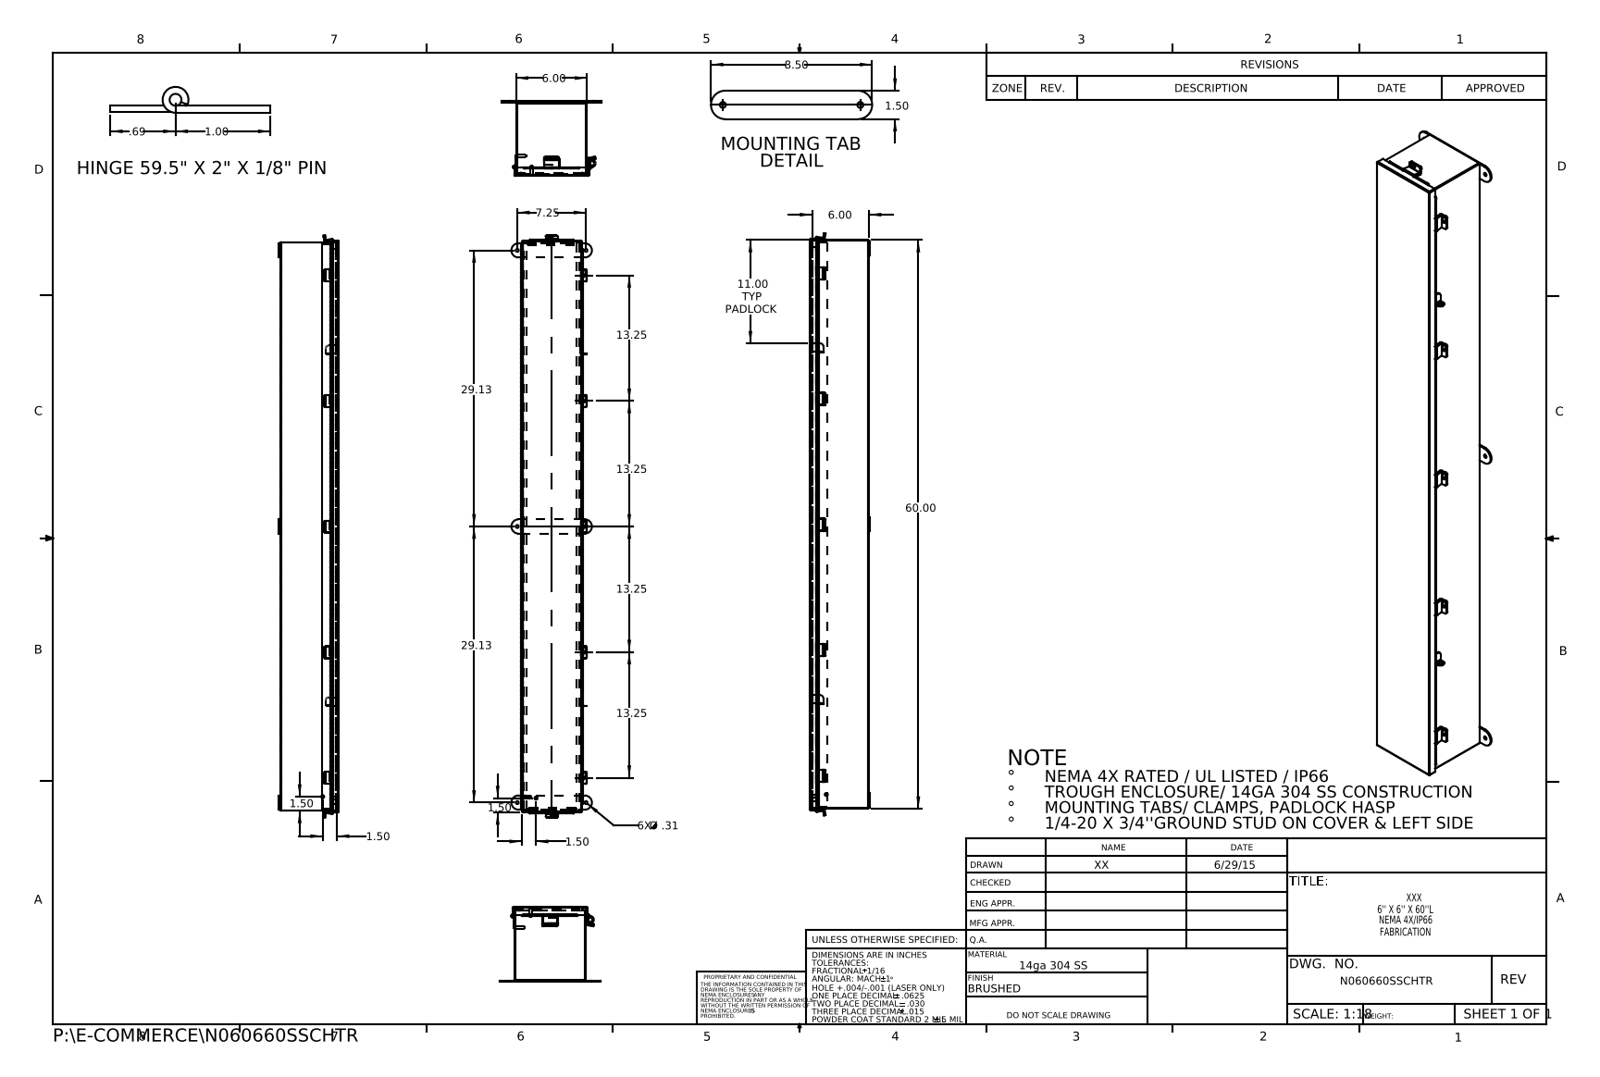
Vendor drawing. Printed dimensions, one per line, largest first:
60.00
29.13
29.13
13.25
13.25
13.25
13.25
11.00 TYP PADLOCK
8.50
7.25
6.00
6.00
1.50
1.50
1.50
1.50
1.50
1.00
.69
6X Ø .31
